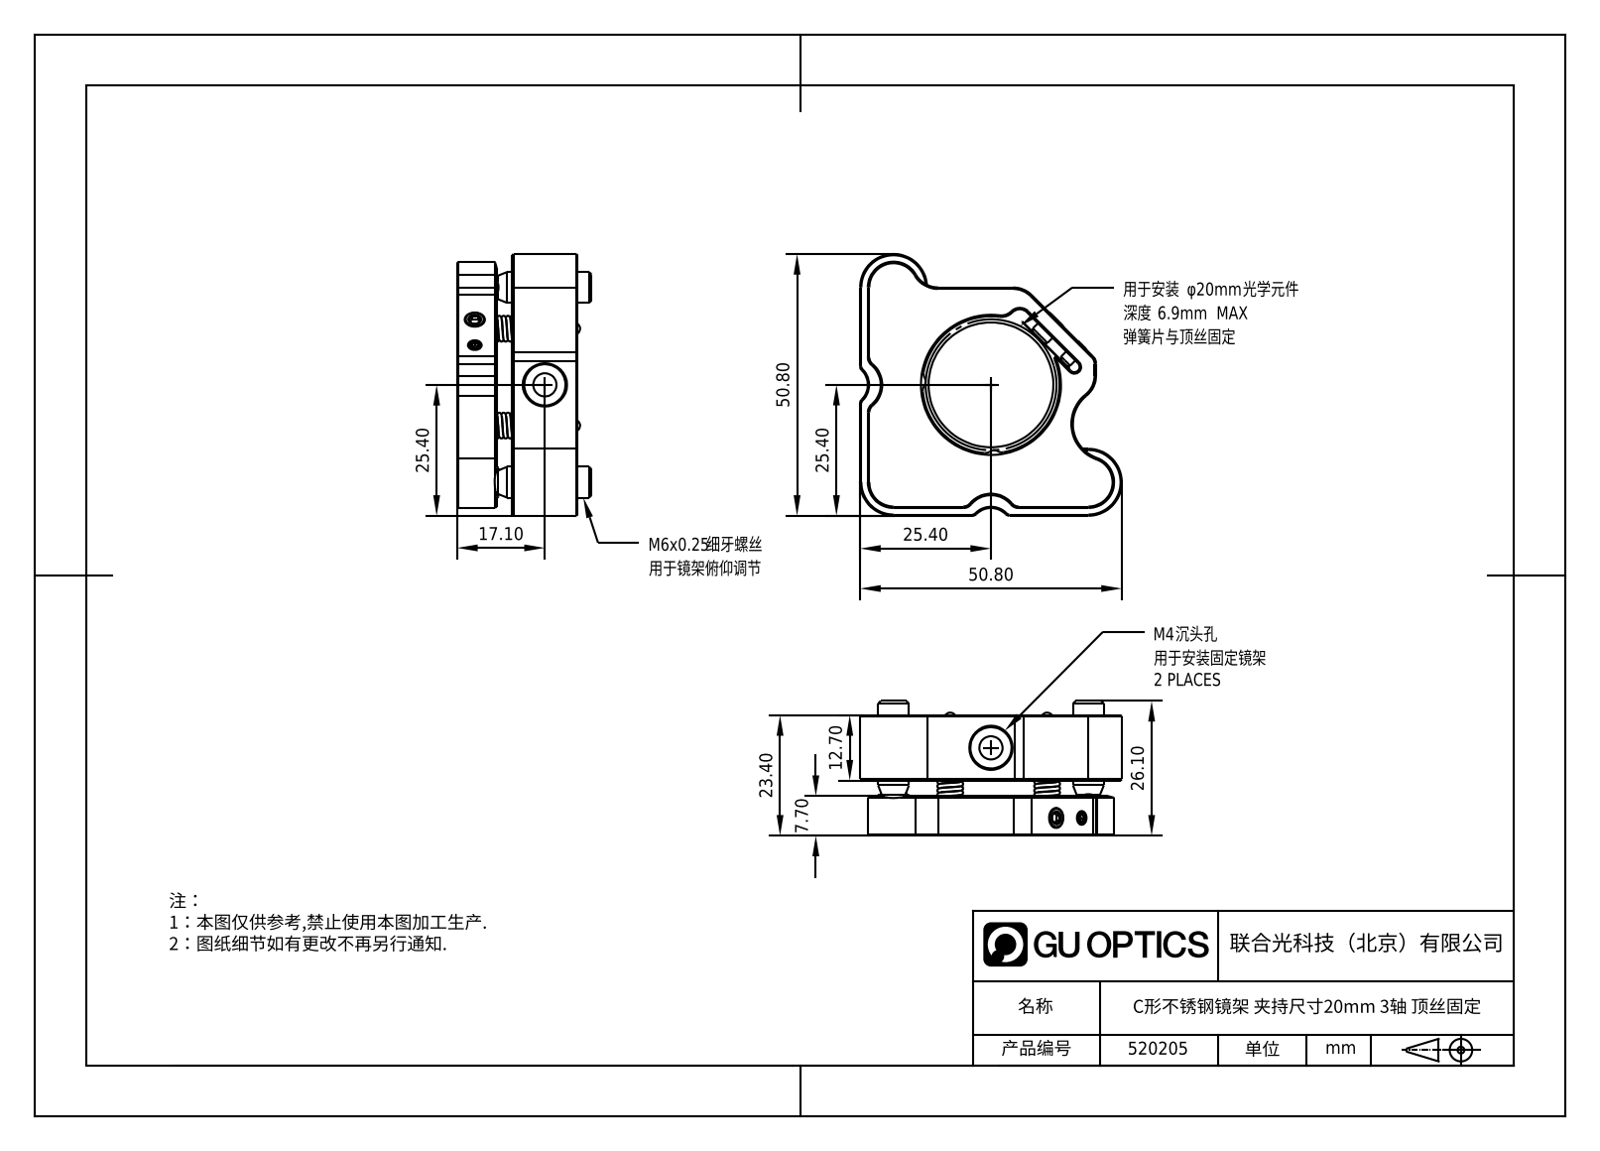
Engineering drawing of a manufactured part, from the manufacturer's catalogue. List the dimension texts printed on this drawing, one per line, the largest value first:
50.80
50.80
26.10
25.40
25.40
25.40
23.40
17.10
12.70
7.70
